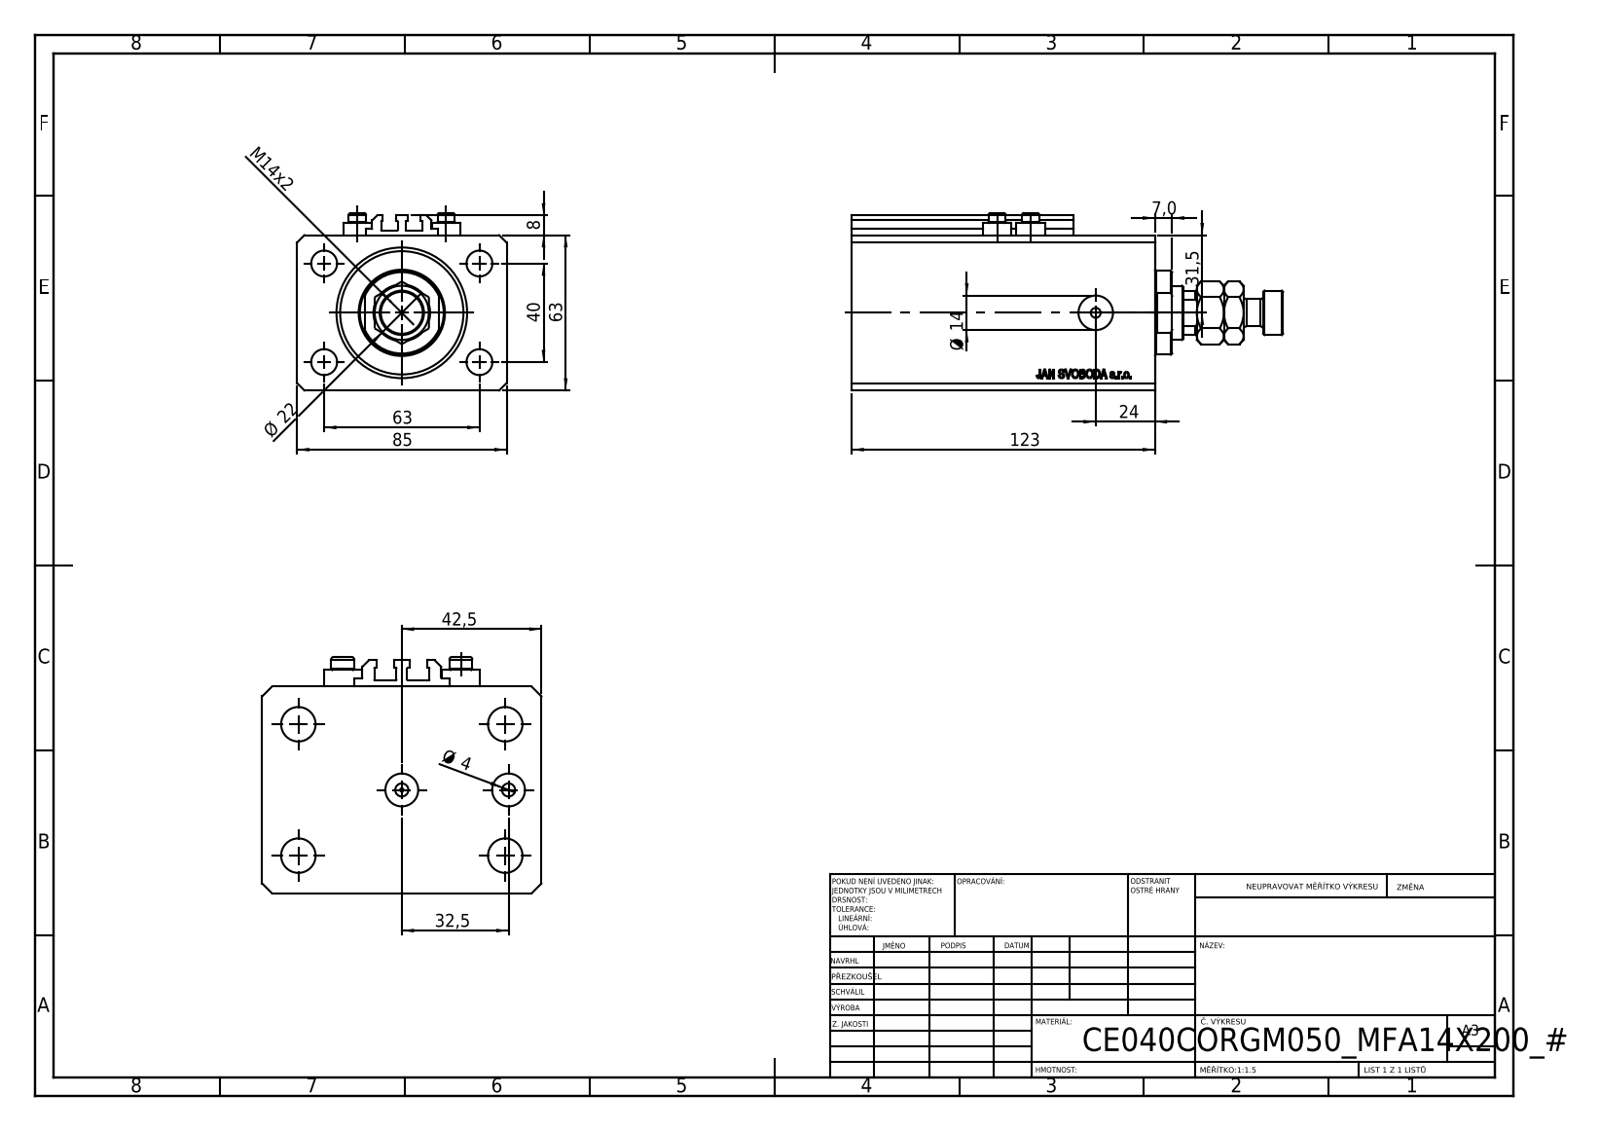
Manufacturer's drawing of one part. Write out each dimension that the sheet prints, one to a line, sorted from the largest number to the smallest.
123
85
63
63
42,5
40
32,5
31,5
24
Ø 22
M14x2
Ø 14
8
7,0
Ø 4
